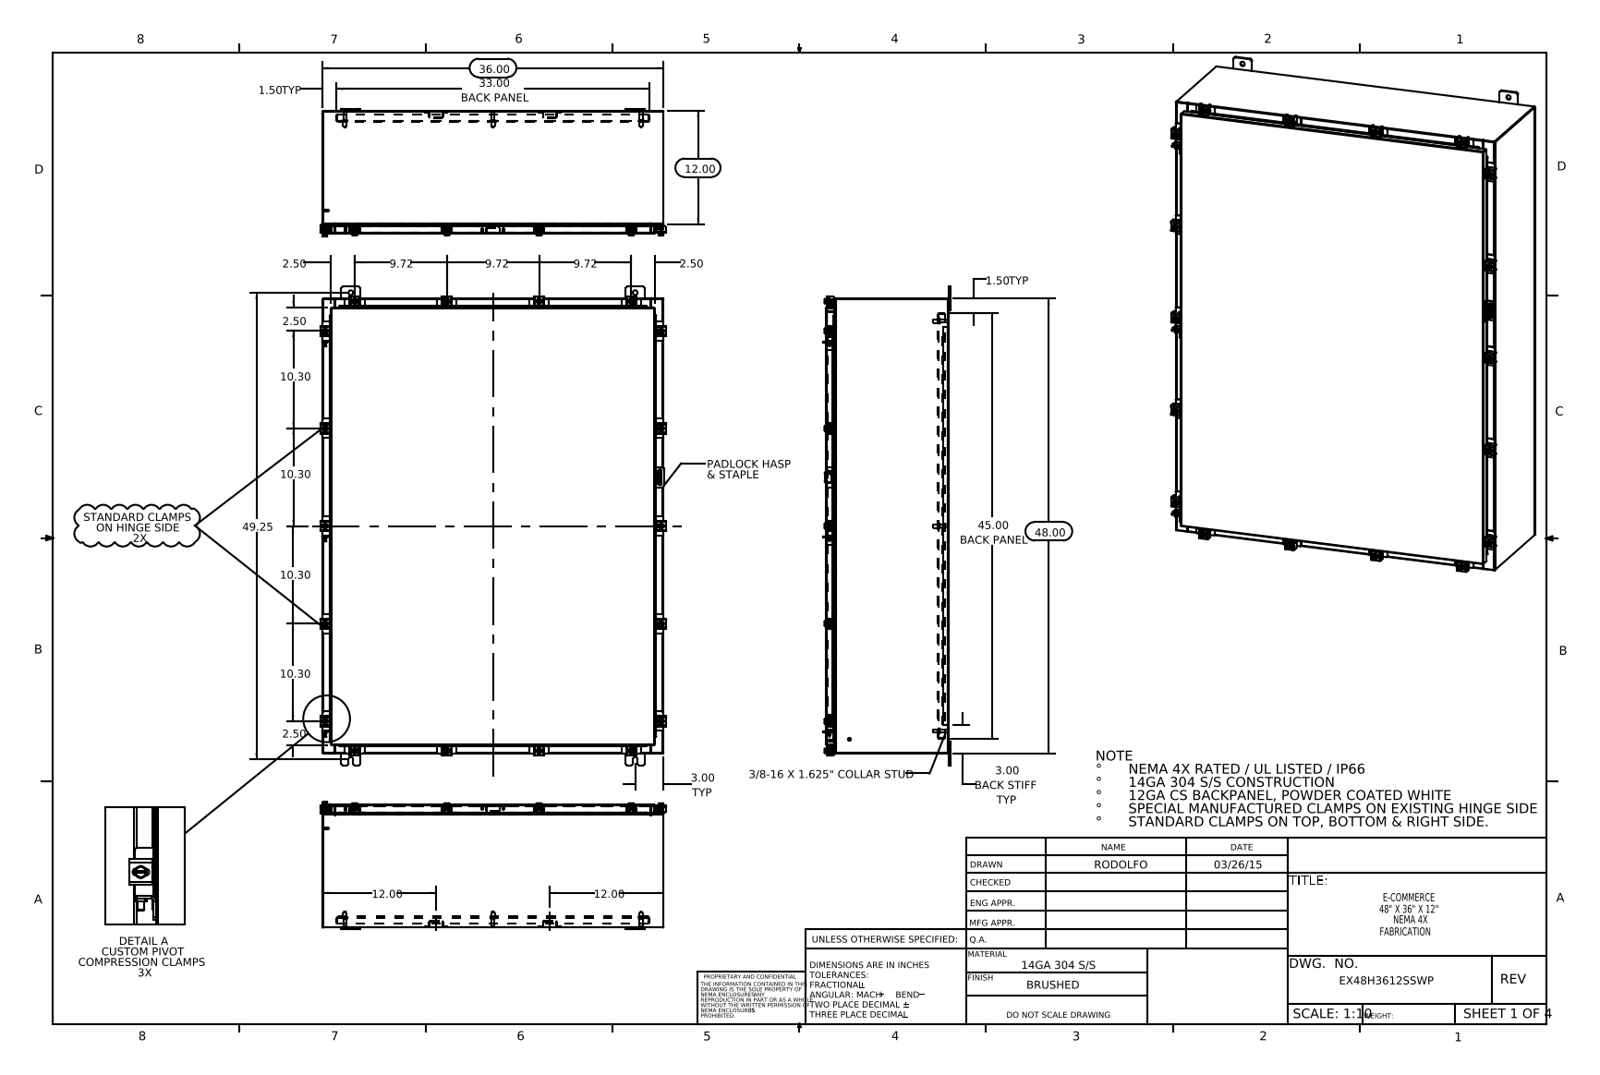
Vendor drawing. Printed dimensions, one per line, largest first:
49.25
48.00
45.00 BACK PANEL
36.00
33.00 BACK PANEL
12.00
12.00
12.00
10.30
10.30
10.30
10.30
9.72
9.72
9.72
3.00 TYP
3.00 BACK STIFF TYP
2.50
2.50
2.50
2.50
1.50 TYP
1.50 TYP
